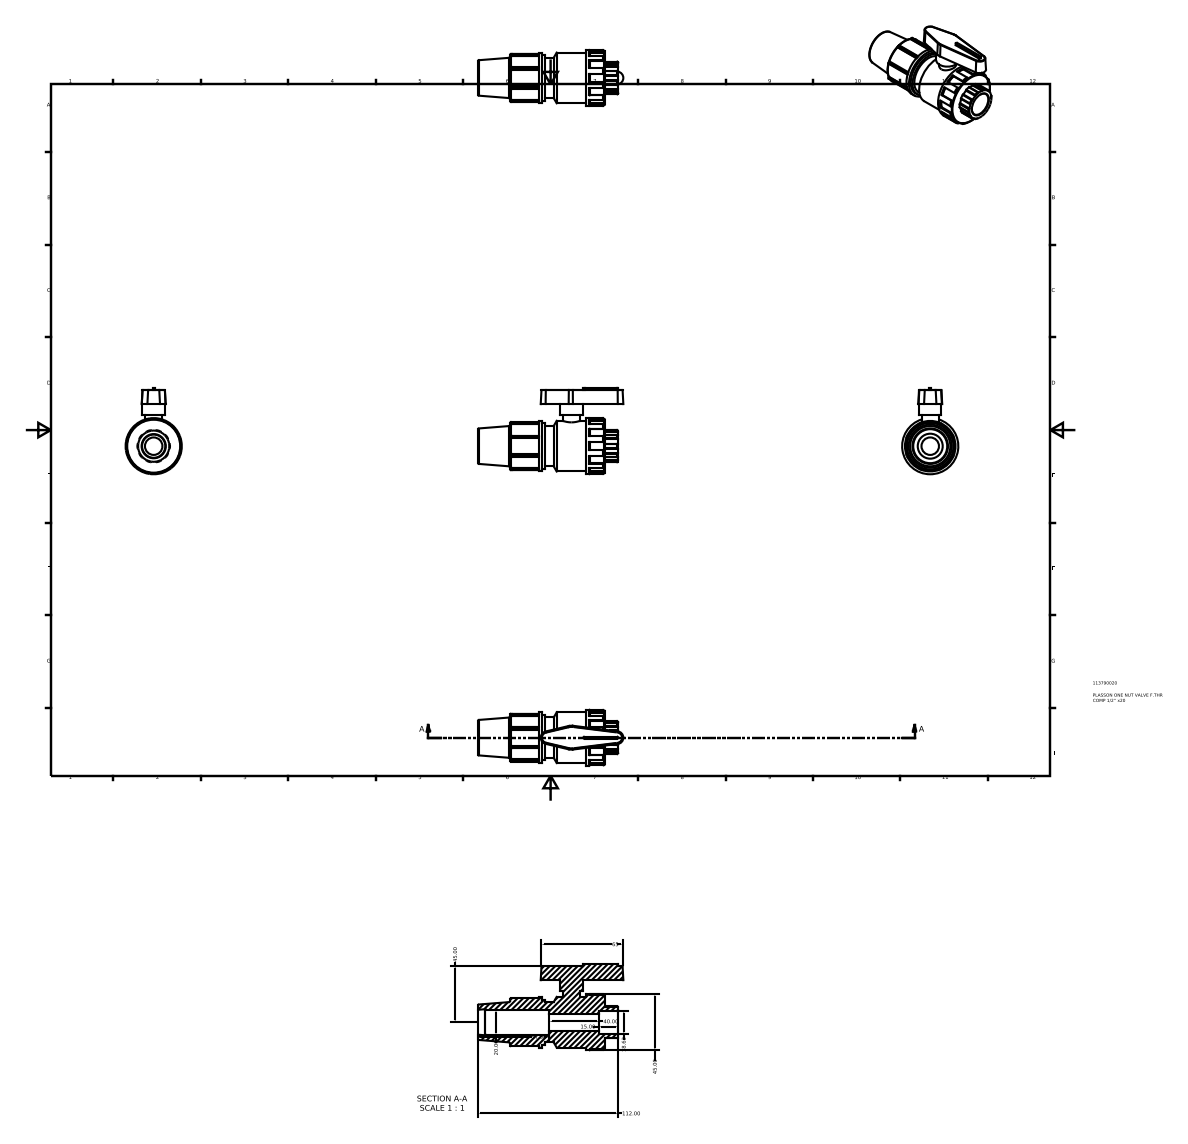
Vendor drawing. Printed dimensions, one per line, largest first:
112.00
65
57.00
45.00
45.00
40.00
20.00
18.63
15.00
